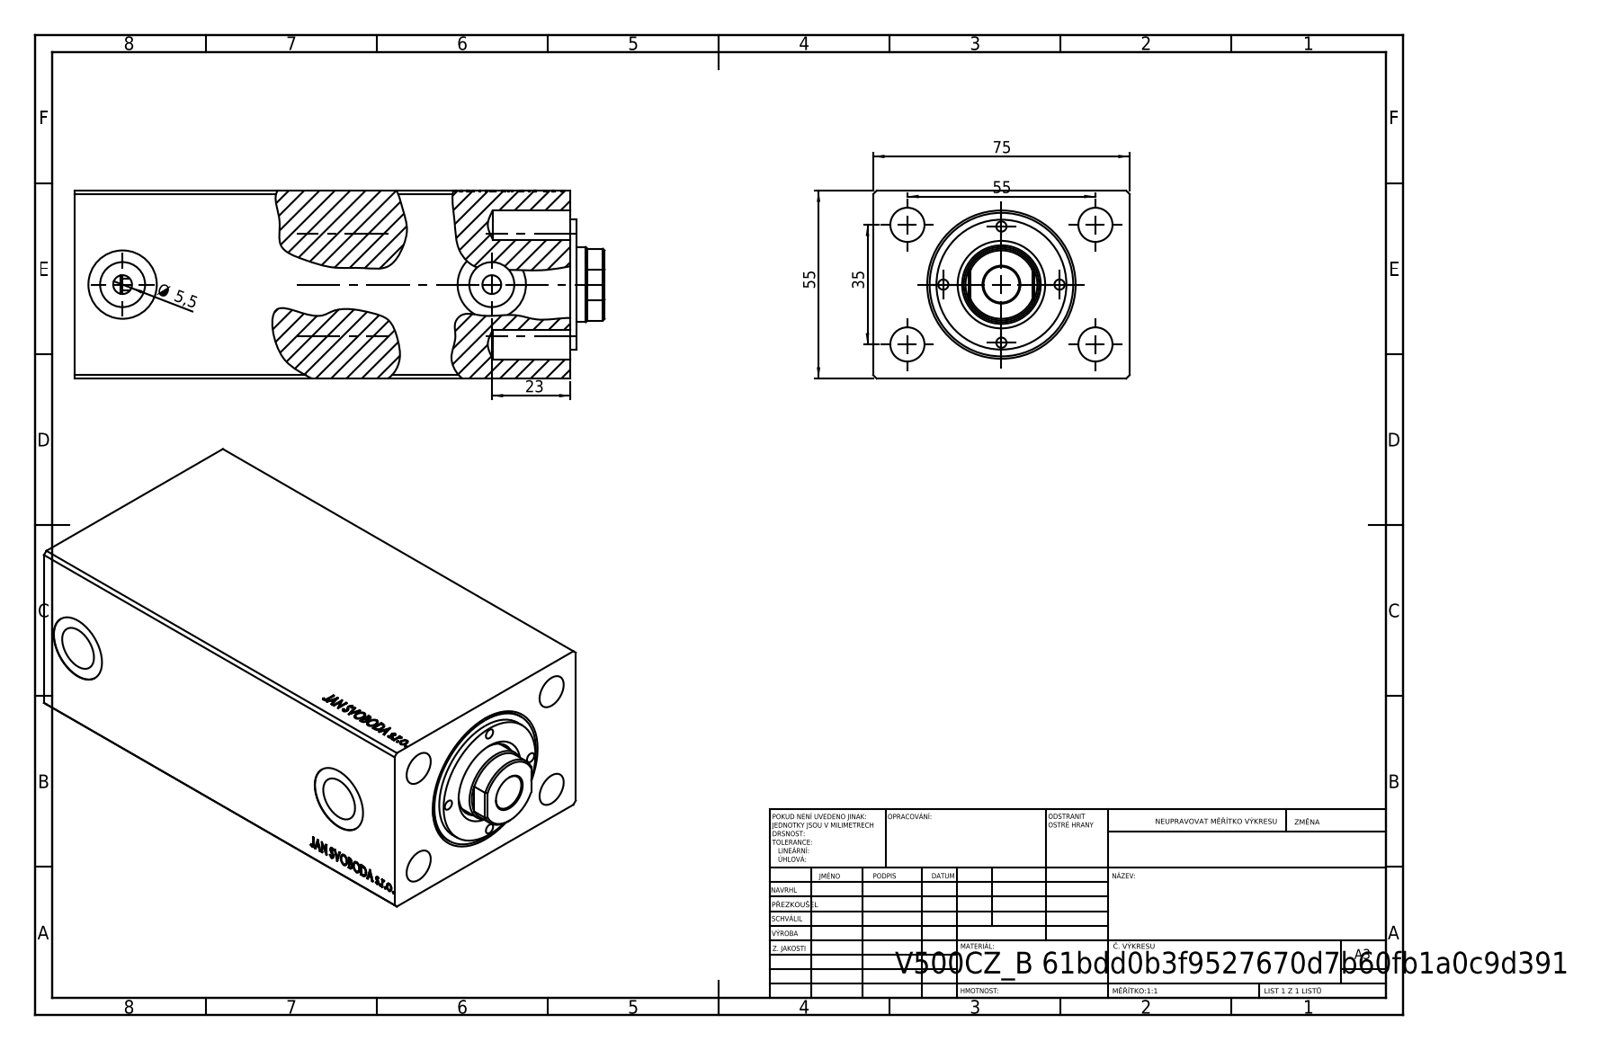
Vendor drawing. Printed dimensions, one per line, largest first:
75
55
55
35
23
Ø 5,5
